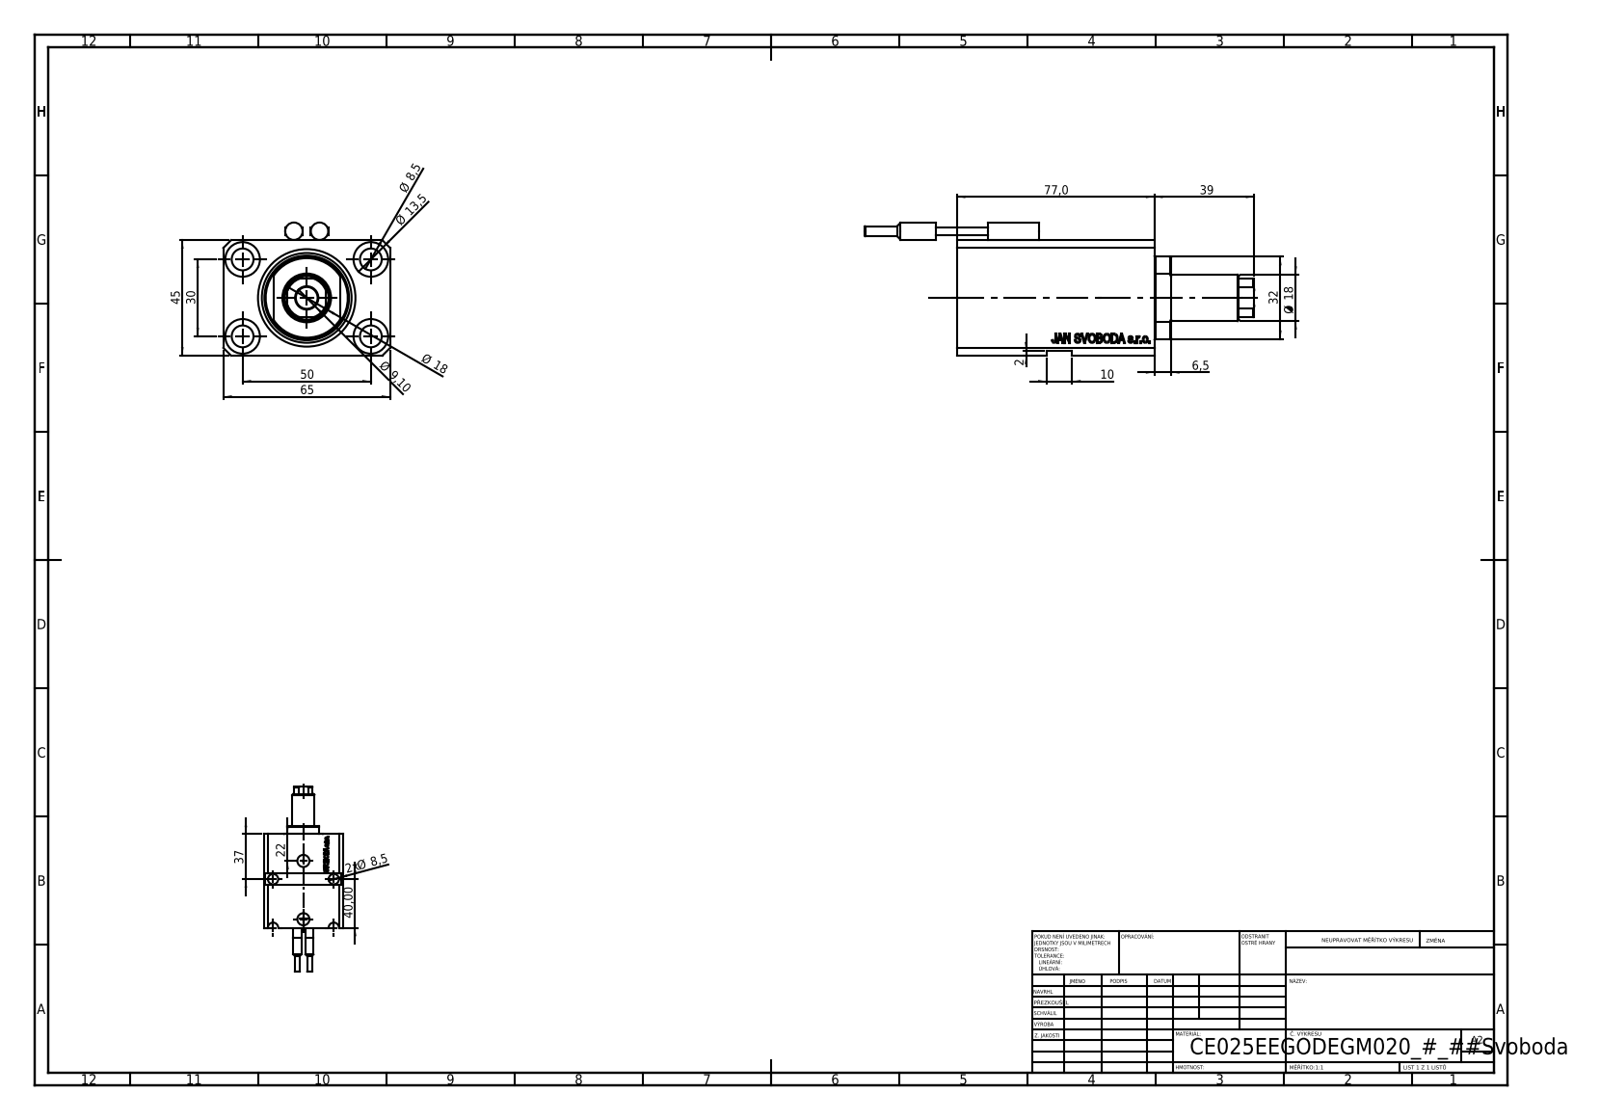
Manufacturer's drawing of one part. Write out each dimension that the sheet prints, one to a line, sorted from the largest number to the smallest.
77,0
65
50
45
40,00
39
37
32
30
22
Ø 18
Ø 18
Ø 13,5
10
Ø 9,10
Ø 8,5
2x Ø 8,5
6,5
2
